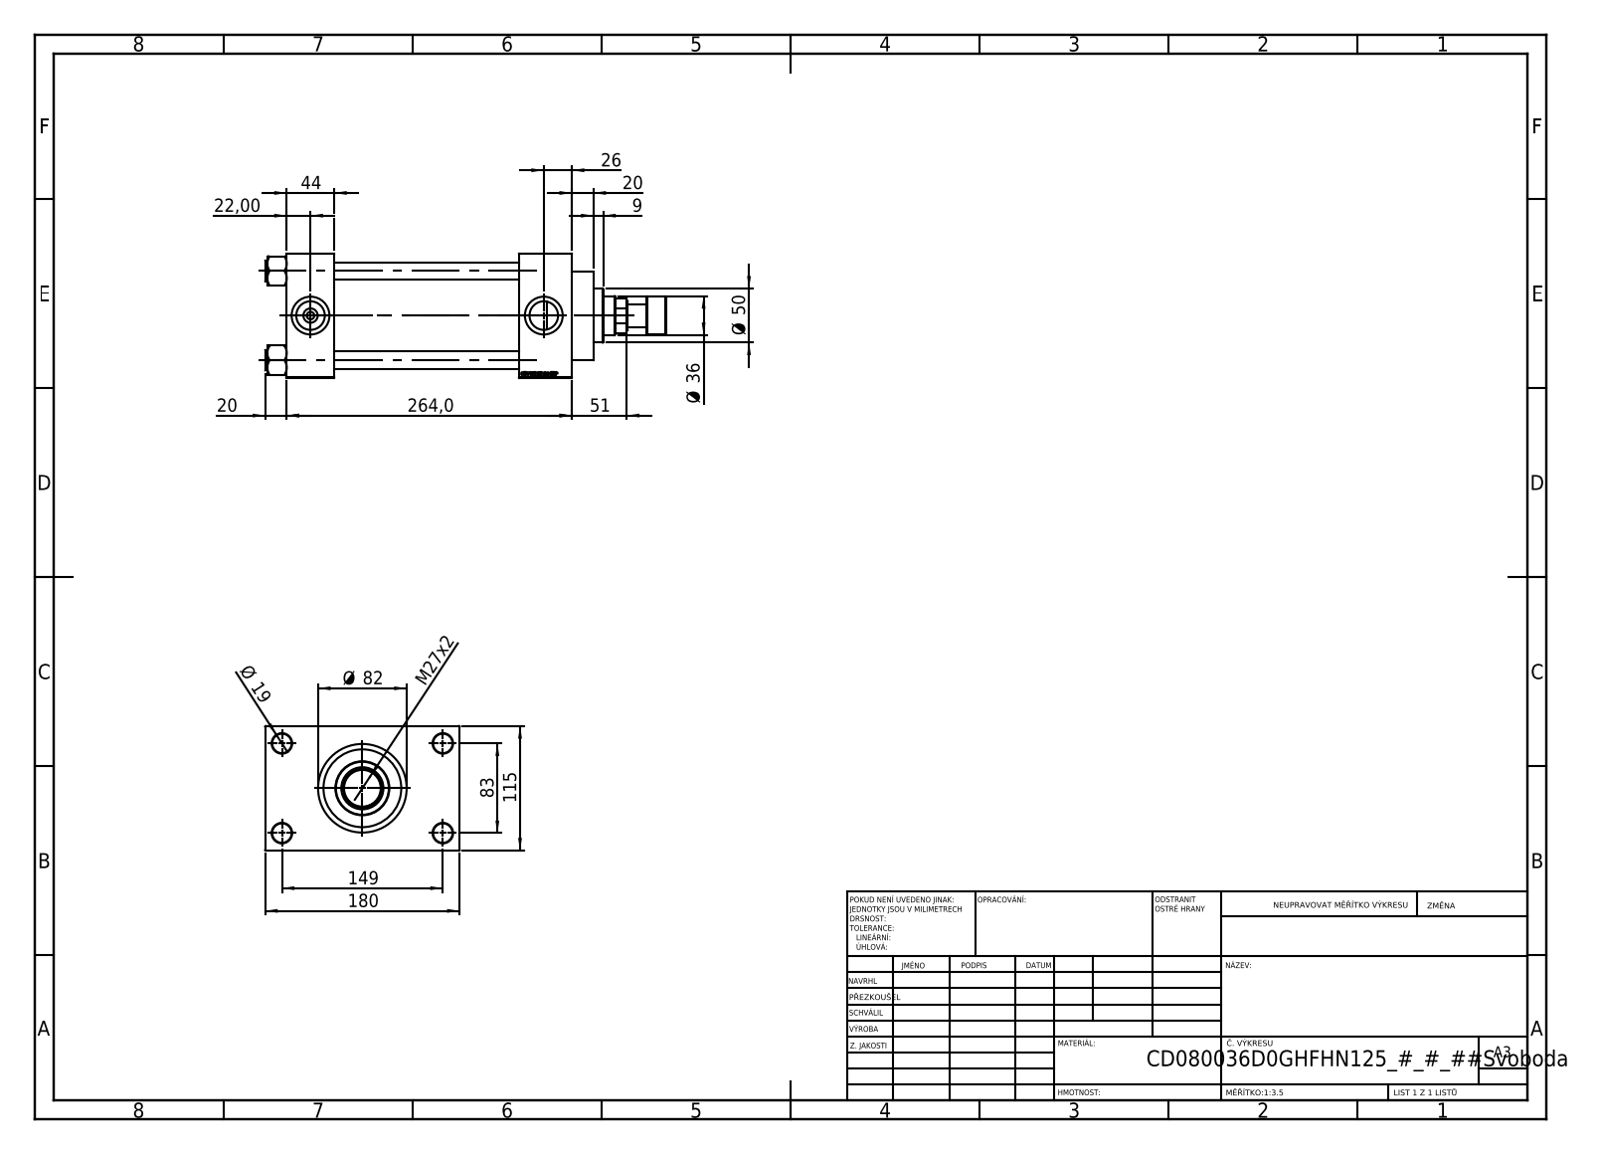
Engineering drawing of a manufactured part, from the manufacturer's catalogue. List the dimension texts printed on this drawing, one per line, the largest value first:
264,0
180
149
115
83
Ø 82
51
Ø 50
44
Ø 36
M27x2
26
22,00
20
20
Ø 19
9
